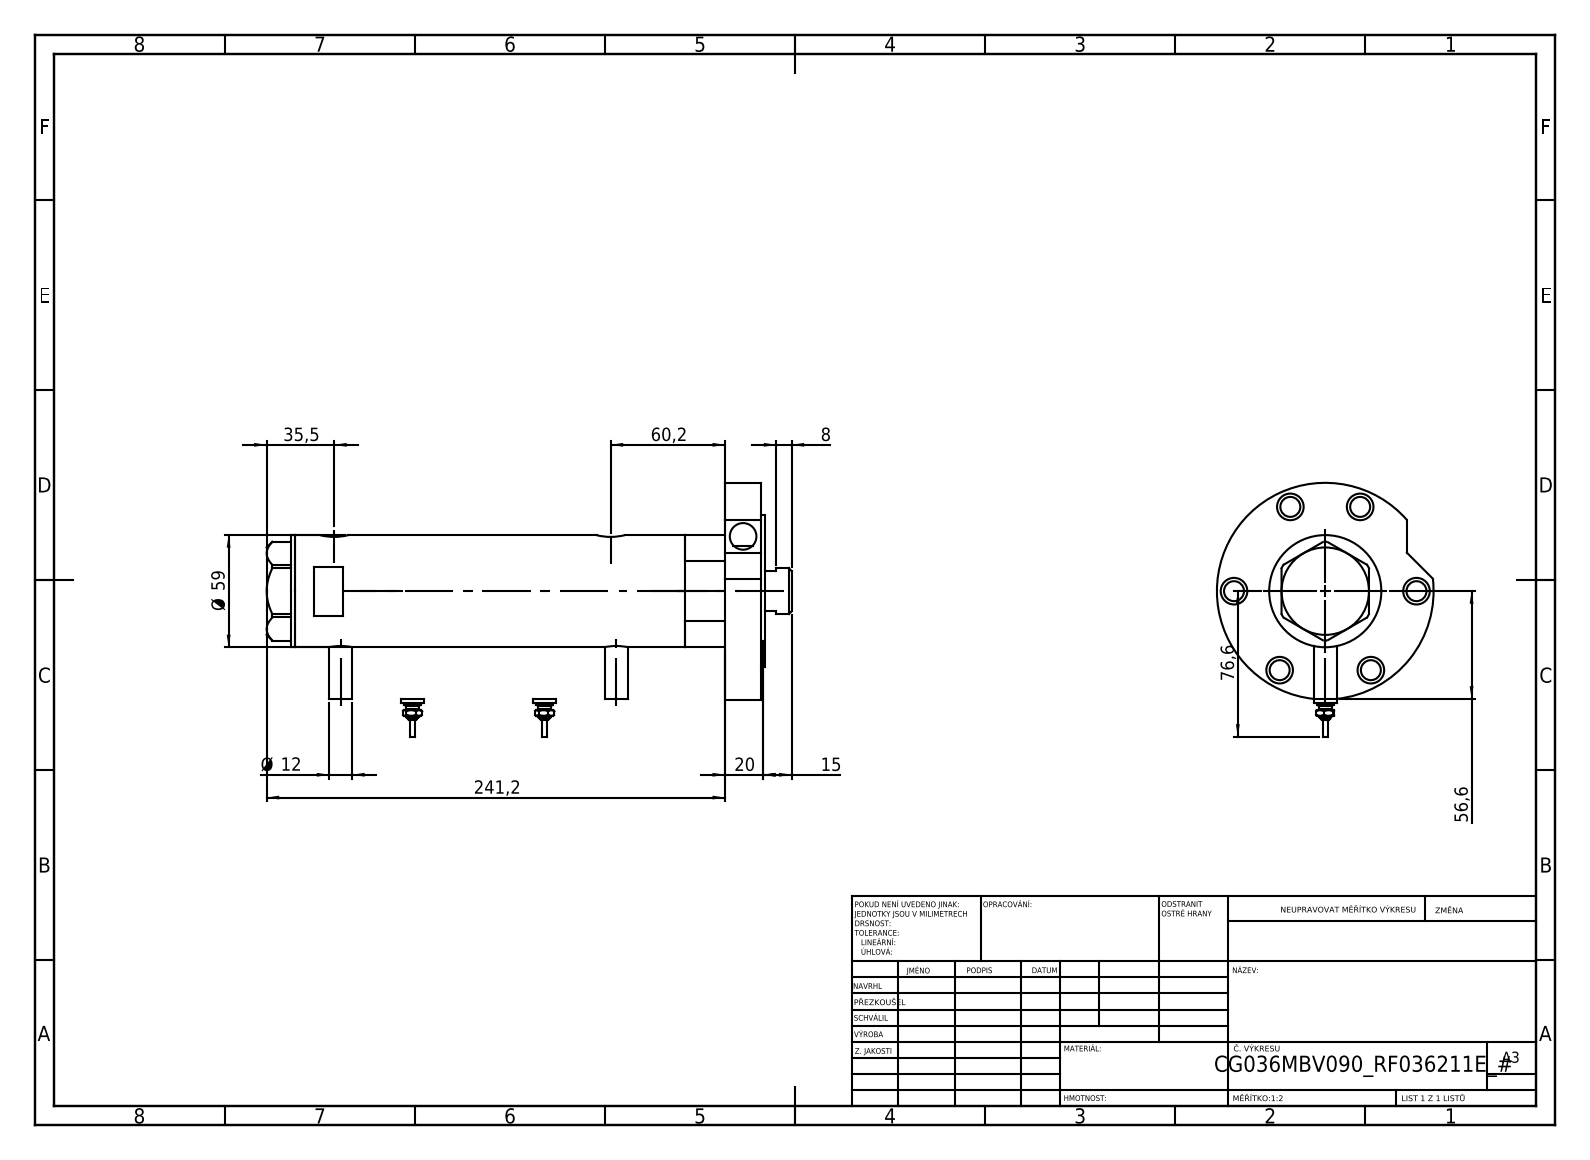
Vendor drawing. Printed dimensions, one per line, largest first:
241,2
76,6
60,2
Ø 59
56,6
35,5
20
15
Ø 12
8
